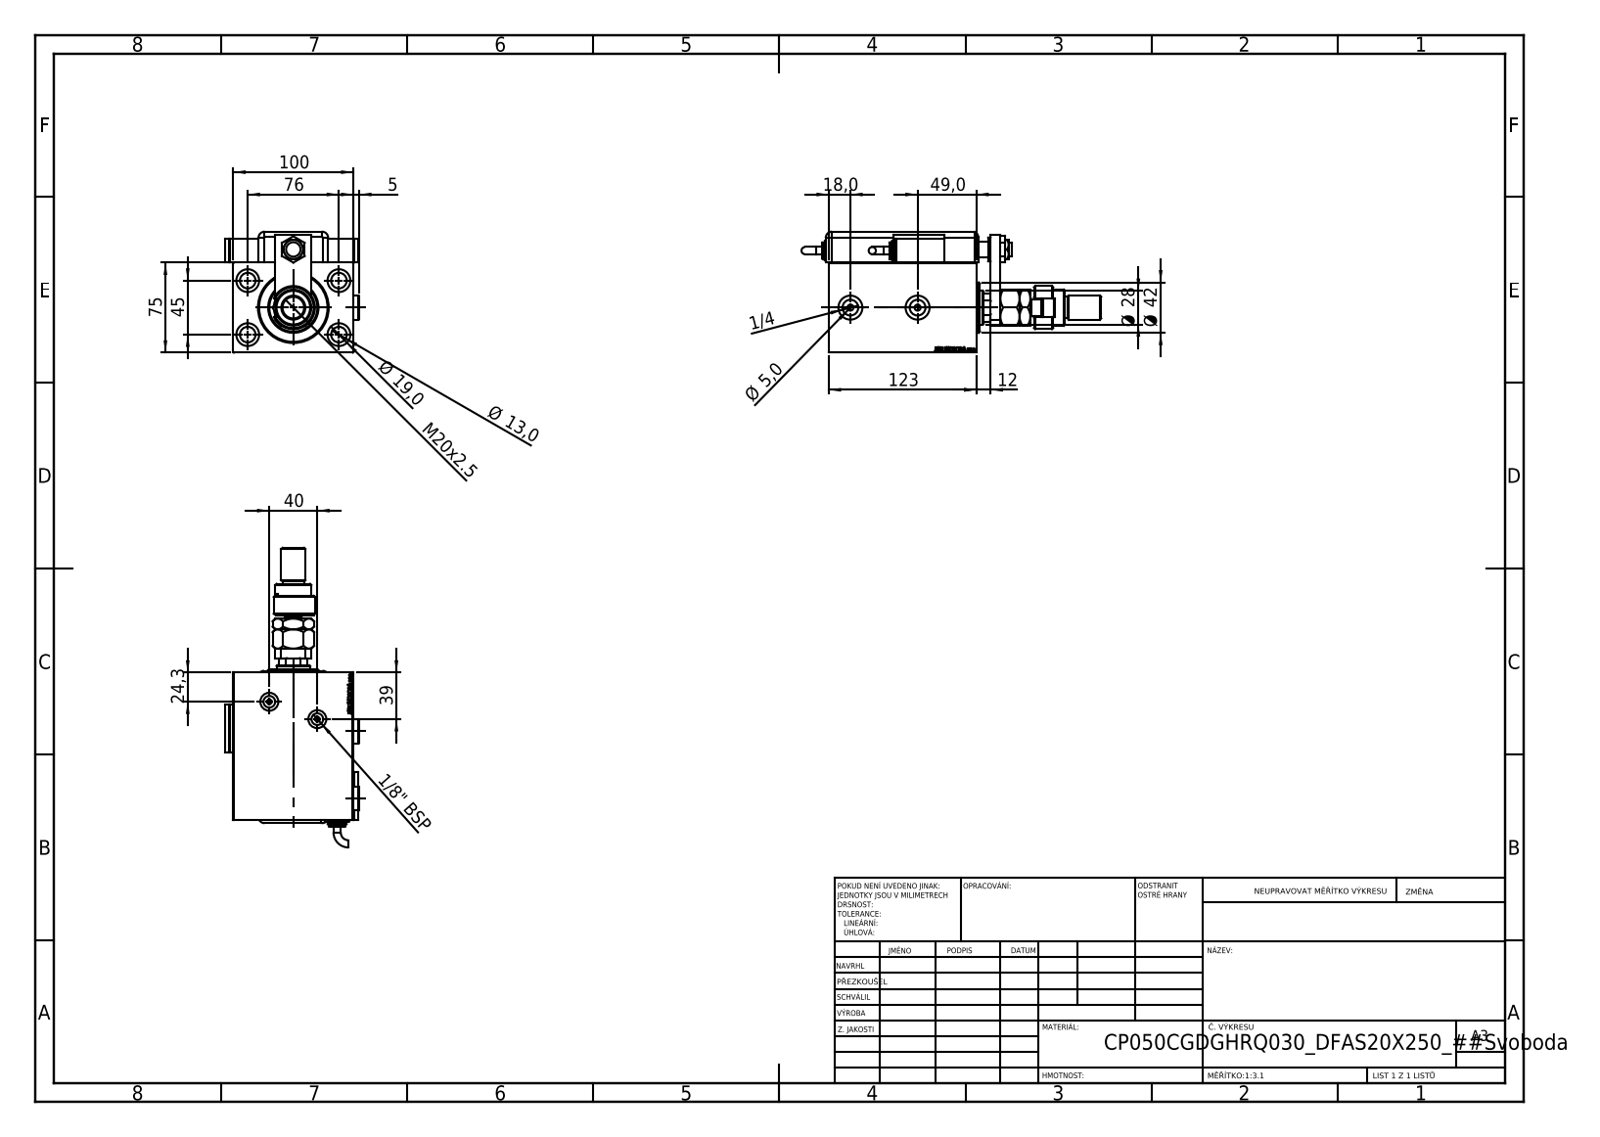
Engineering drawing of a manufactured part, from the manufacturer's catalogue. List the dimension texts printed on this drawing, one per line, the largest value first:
123
100
76
75
49,0
45
Ø 42
40
39
Ø 28
24,3
M20x2.5
Ø 19,0
18,0
Ø 13,0
12
5
Ø 5,0
1/4
1/8" BSP
